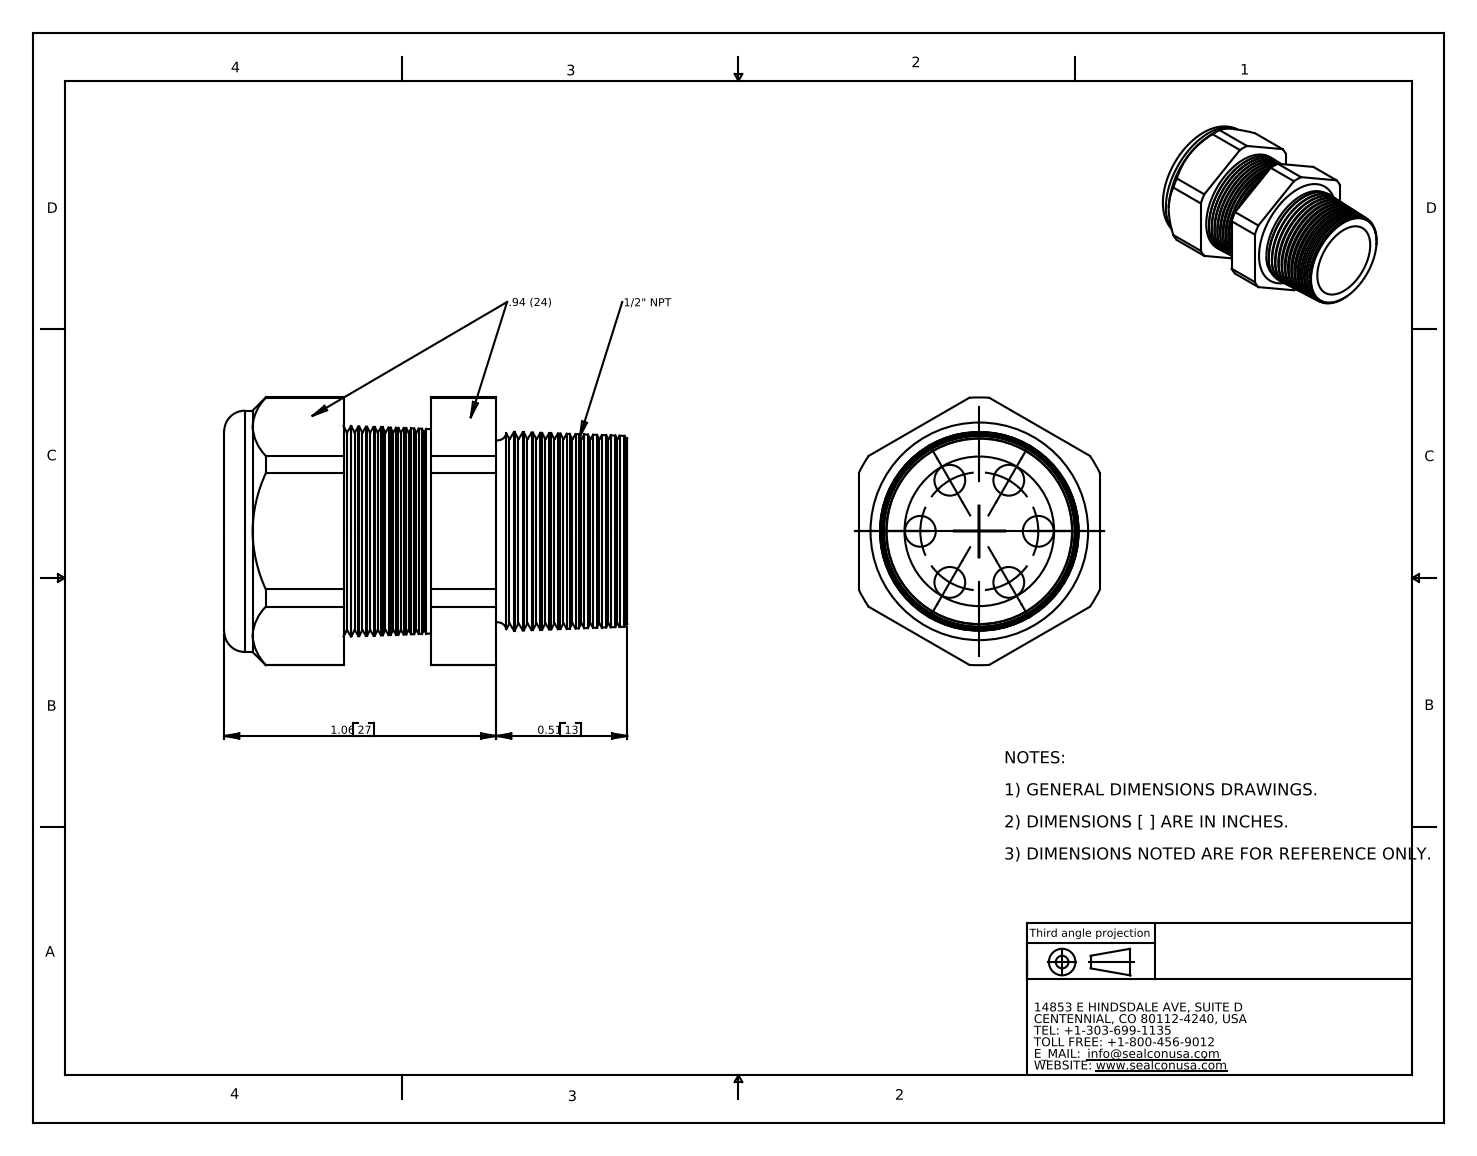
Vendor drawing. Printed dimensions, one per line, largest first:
1.06 27
0.51 13
